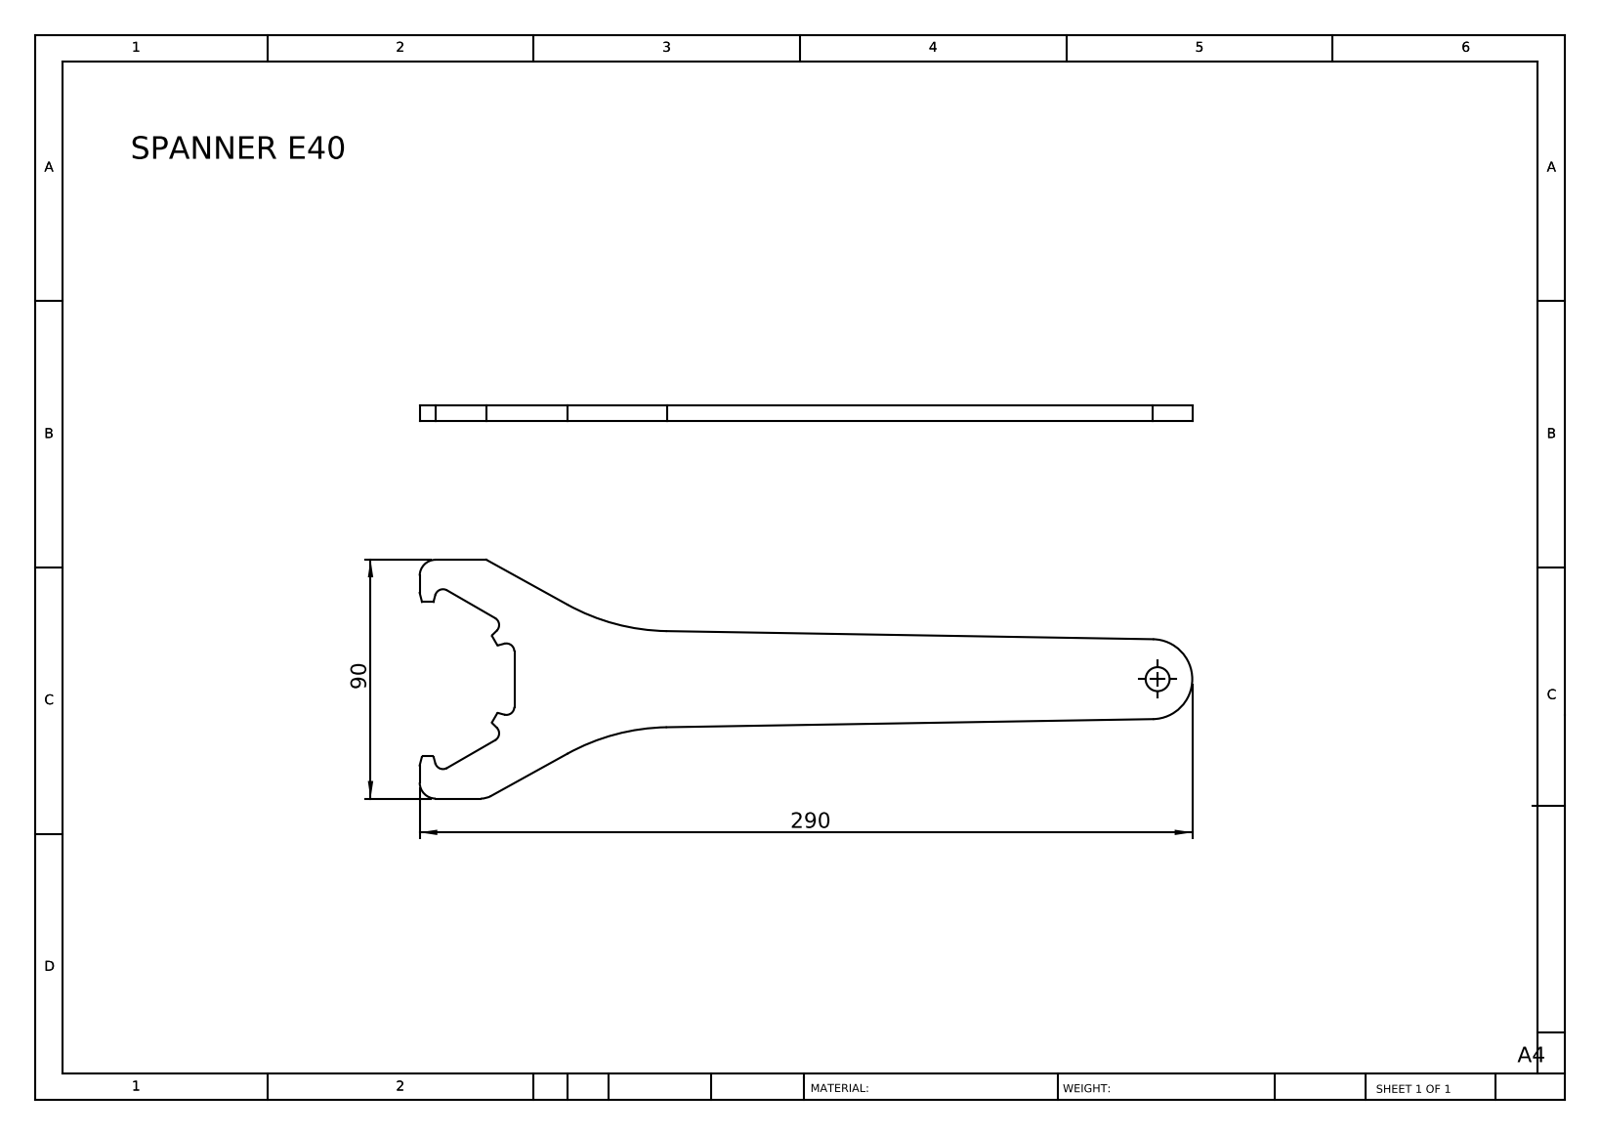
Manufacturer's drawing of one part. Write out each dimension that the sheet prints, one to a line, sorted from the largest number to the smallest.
290
90
